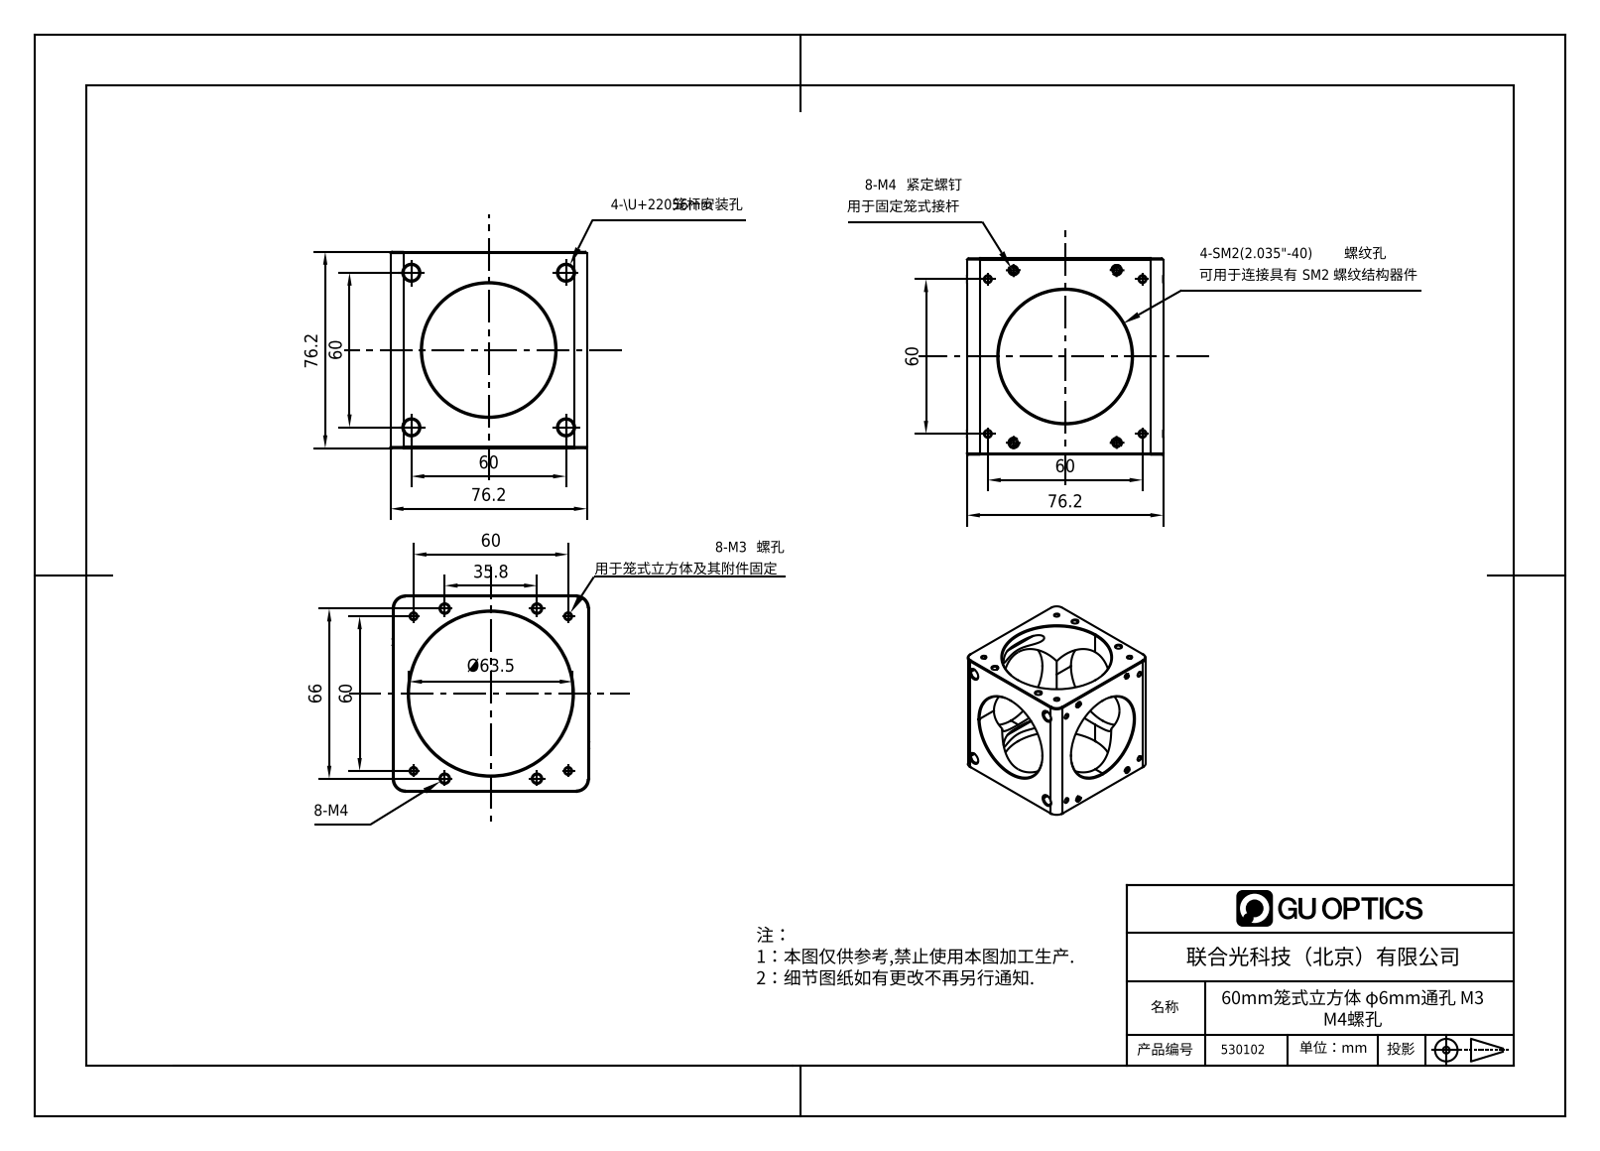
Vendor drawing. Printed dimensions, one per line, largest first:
76.2
76.2
76.2
66
Ø63.5
60
60
60
60
60
60
35.8
